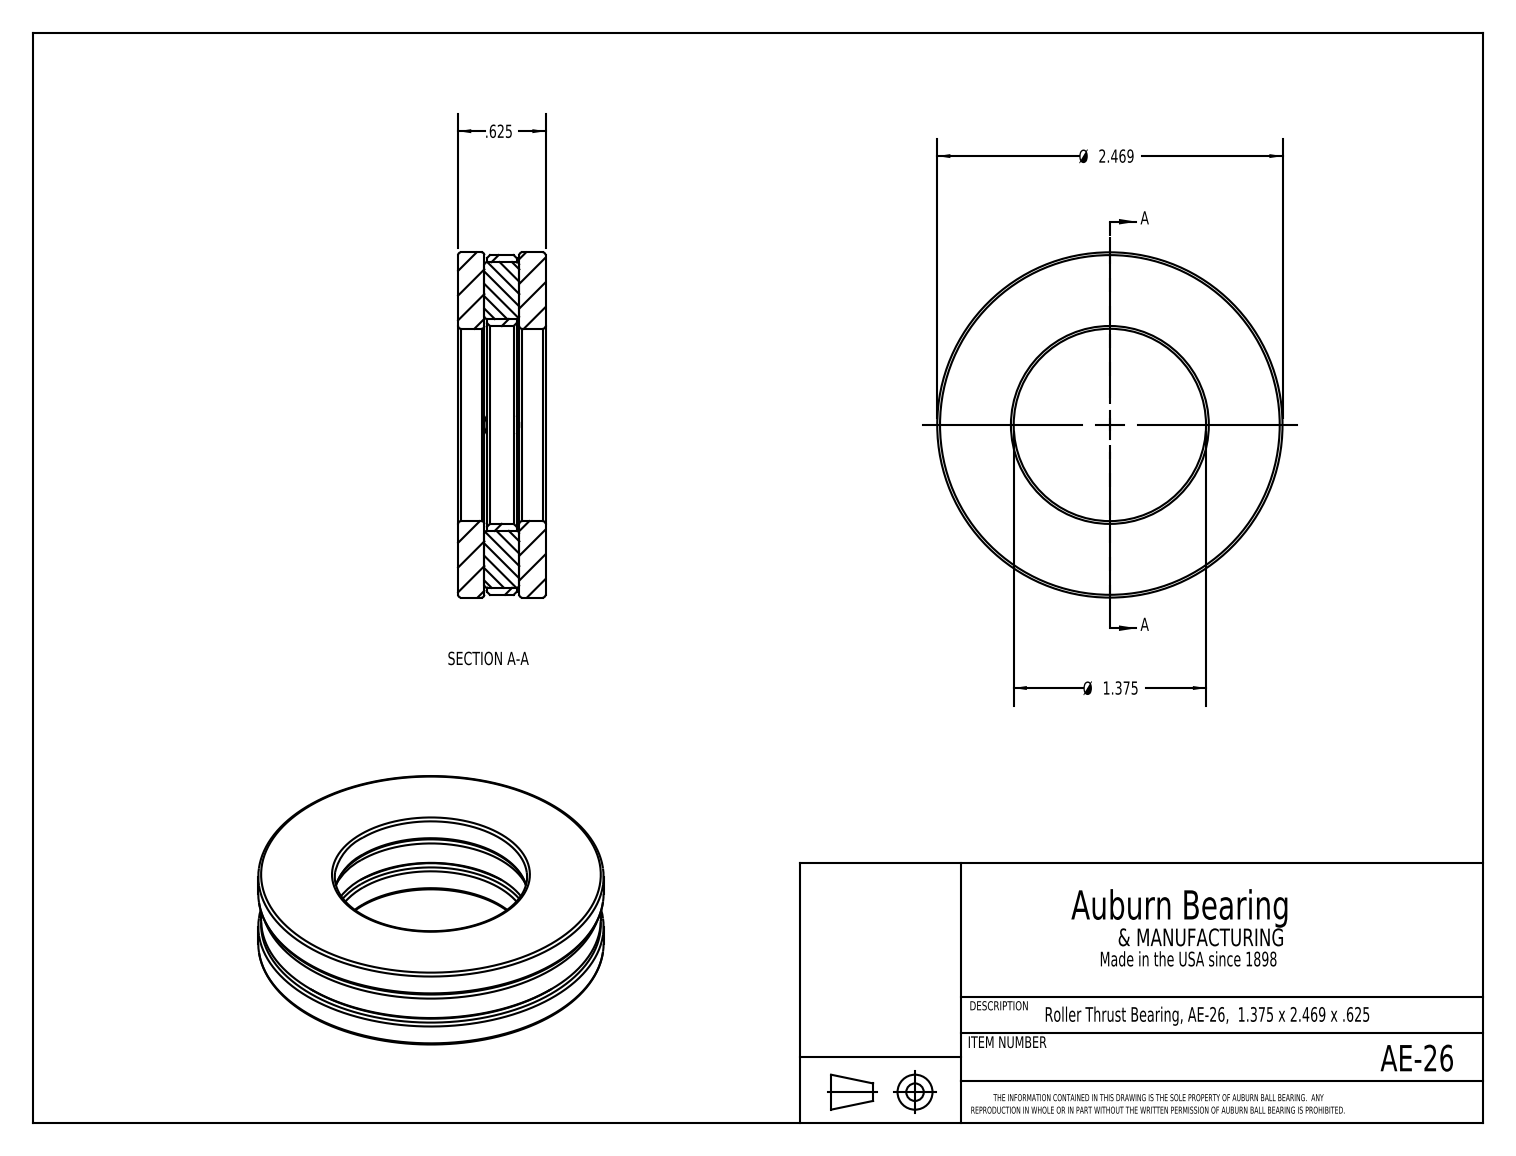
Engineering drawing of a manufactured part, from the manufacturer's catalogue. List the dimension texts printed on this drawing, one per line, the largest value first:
Ø 2.469
Ø 1.375
.625
